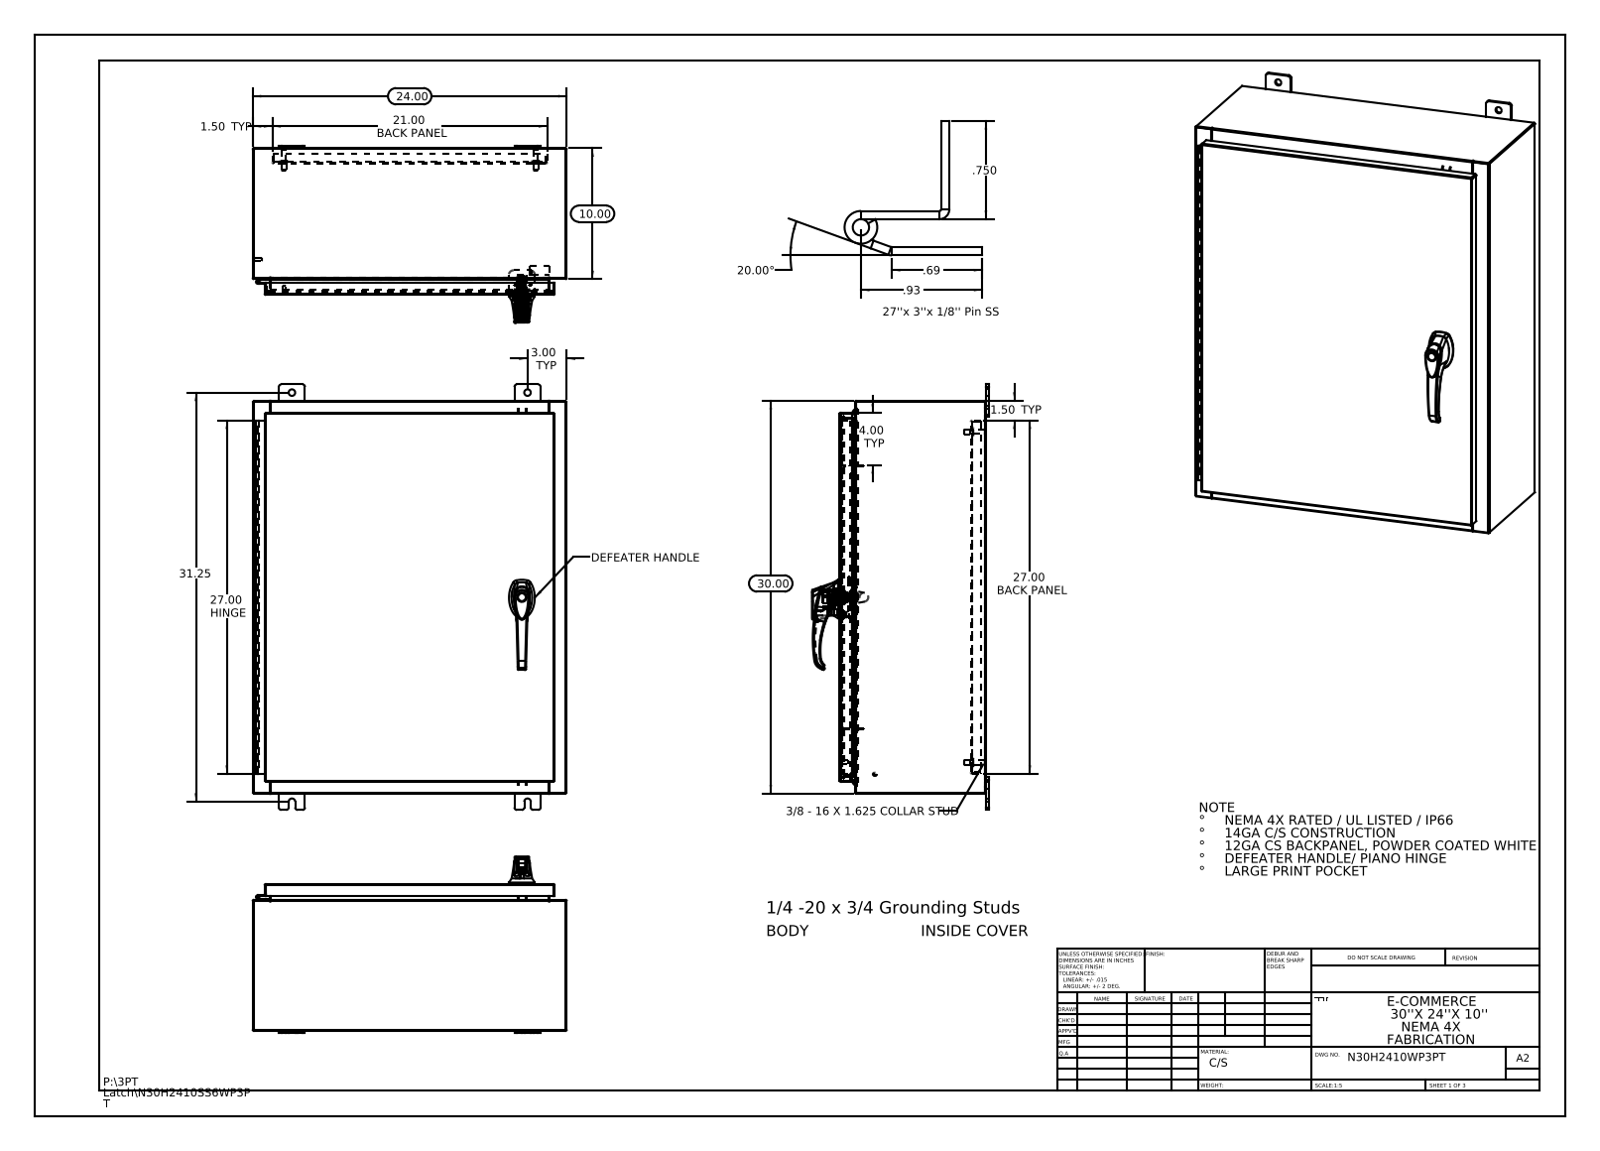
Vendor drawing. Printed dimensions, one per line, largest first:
31.25
30.00
27.00 HINGE
27.00 BACK PANEL
24.00
21.00 BACK PANEL
20.00°
10.00
4.00 TYP
3.00 TYP
1.50 TYP
1.50 TYP
.93
.750
.69
